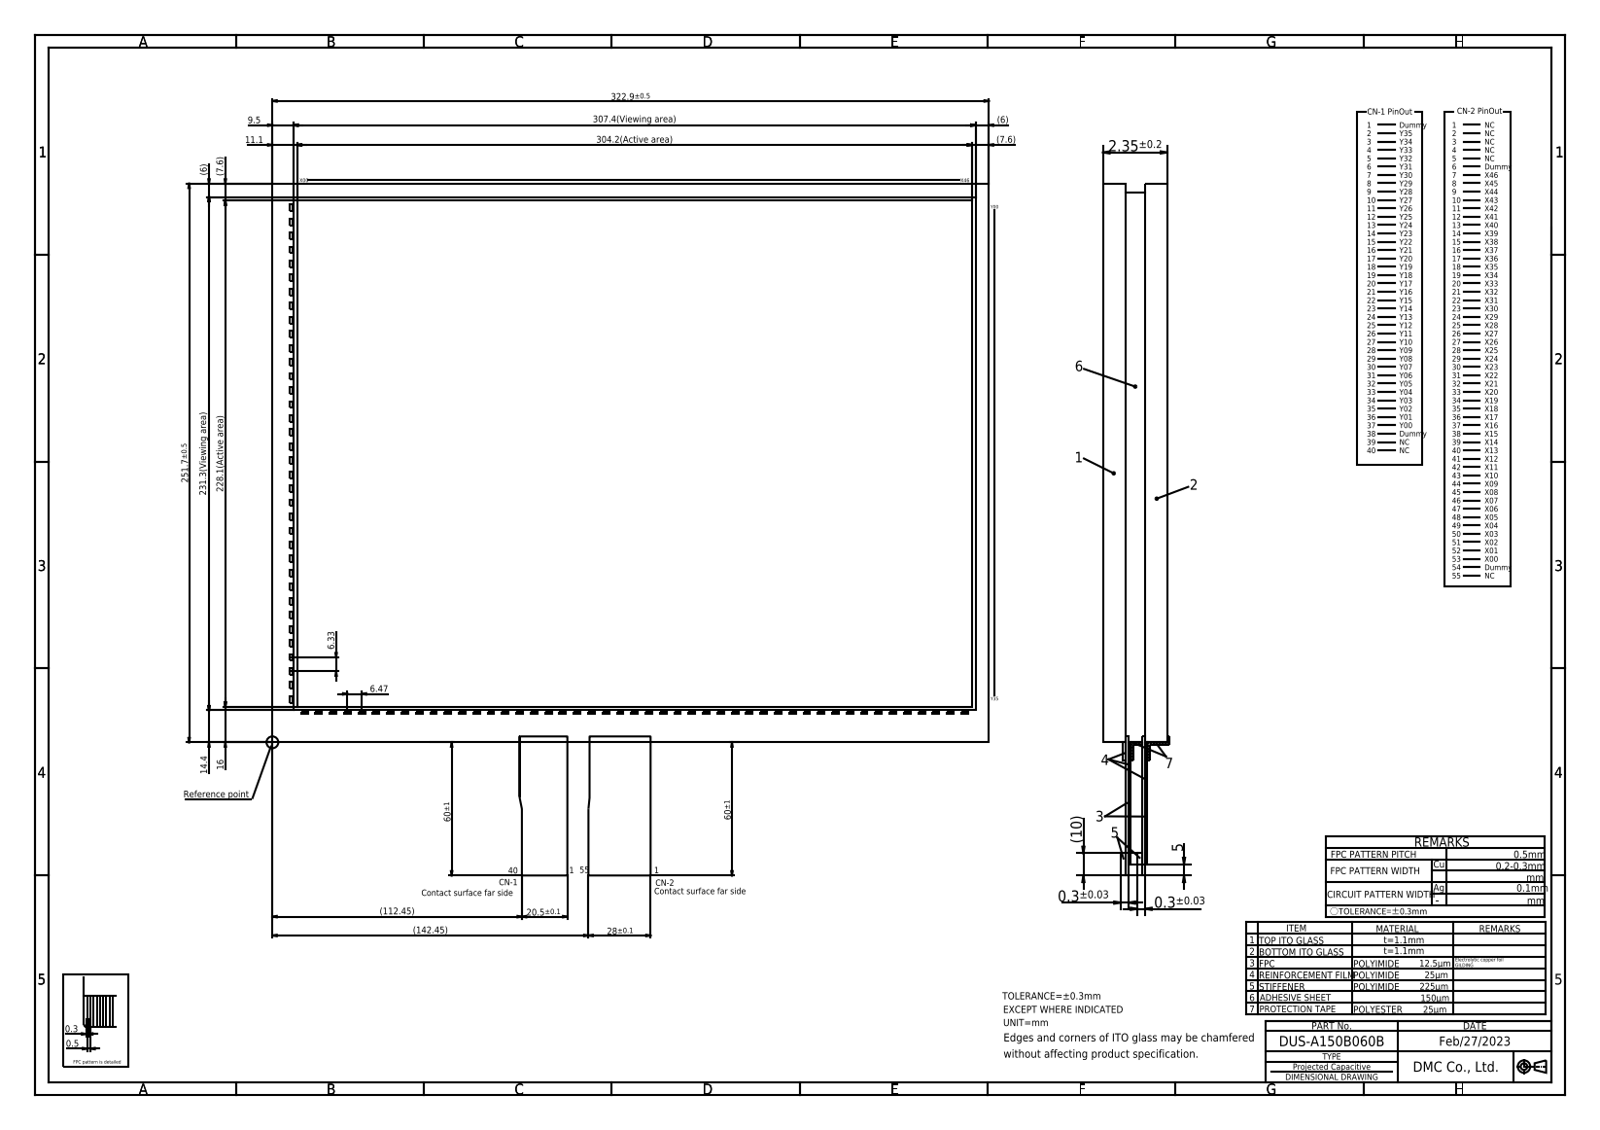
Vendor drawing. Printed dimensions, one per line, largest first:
322.9±0.5
307.4(Viewing area)
304.2(Active area)
251.7±0.5
231.3(Viewing area)
228.1(Active area)
(142.45)
(112.45)
60±1
60±1
28±0.1
20.5±0.1
16
14.4
11.1
(10)
9.5
(7.6)
(7.6)
6.47
6.33
(6)
(6)
5
2.35±0.2
0.5
0.3
0.3±0.03
0.3±0.03
